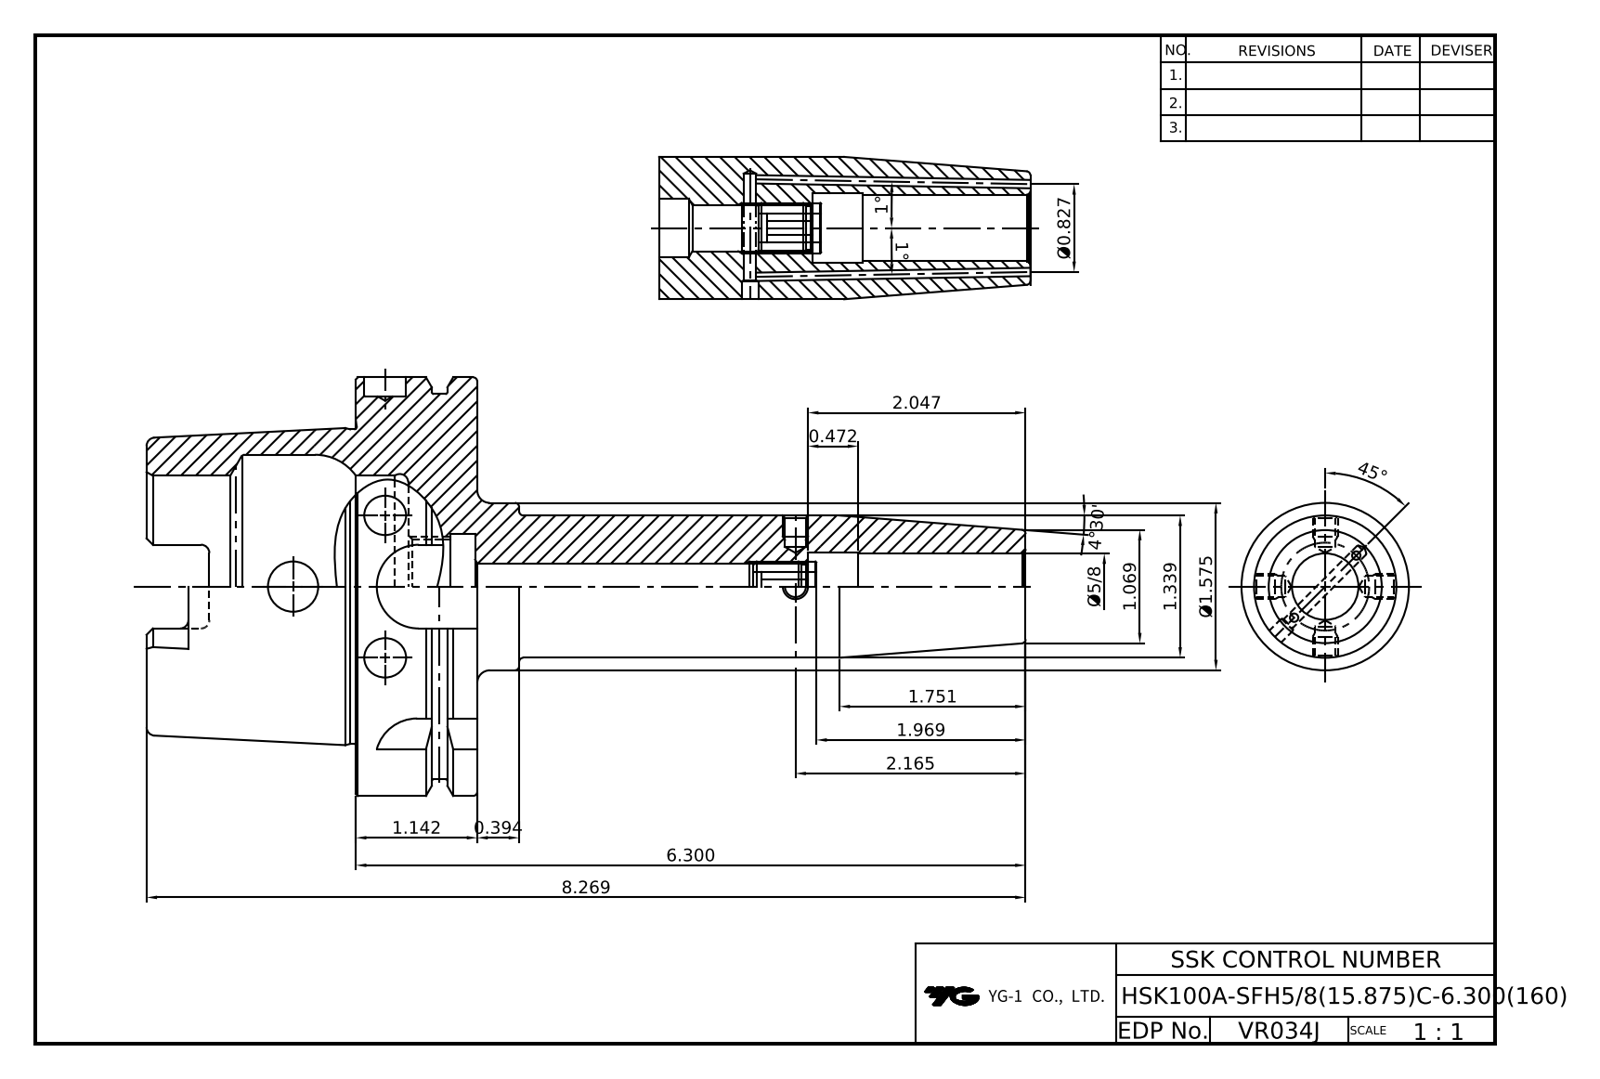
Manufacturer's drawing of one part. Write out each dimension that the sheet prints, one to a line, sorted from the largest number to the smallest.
45°
8.269
6.300
2.165
2.047
1.969
1.751
Ø1.575
1.339
1.142
1.069
1°
1°
Ø0.827
0.472
0.394
